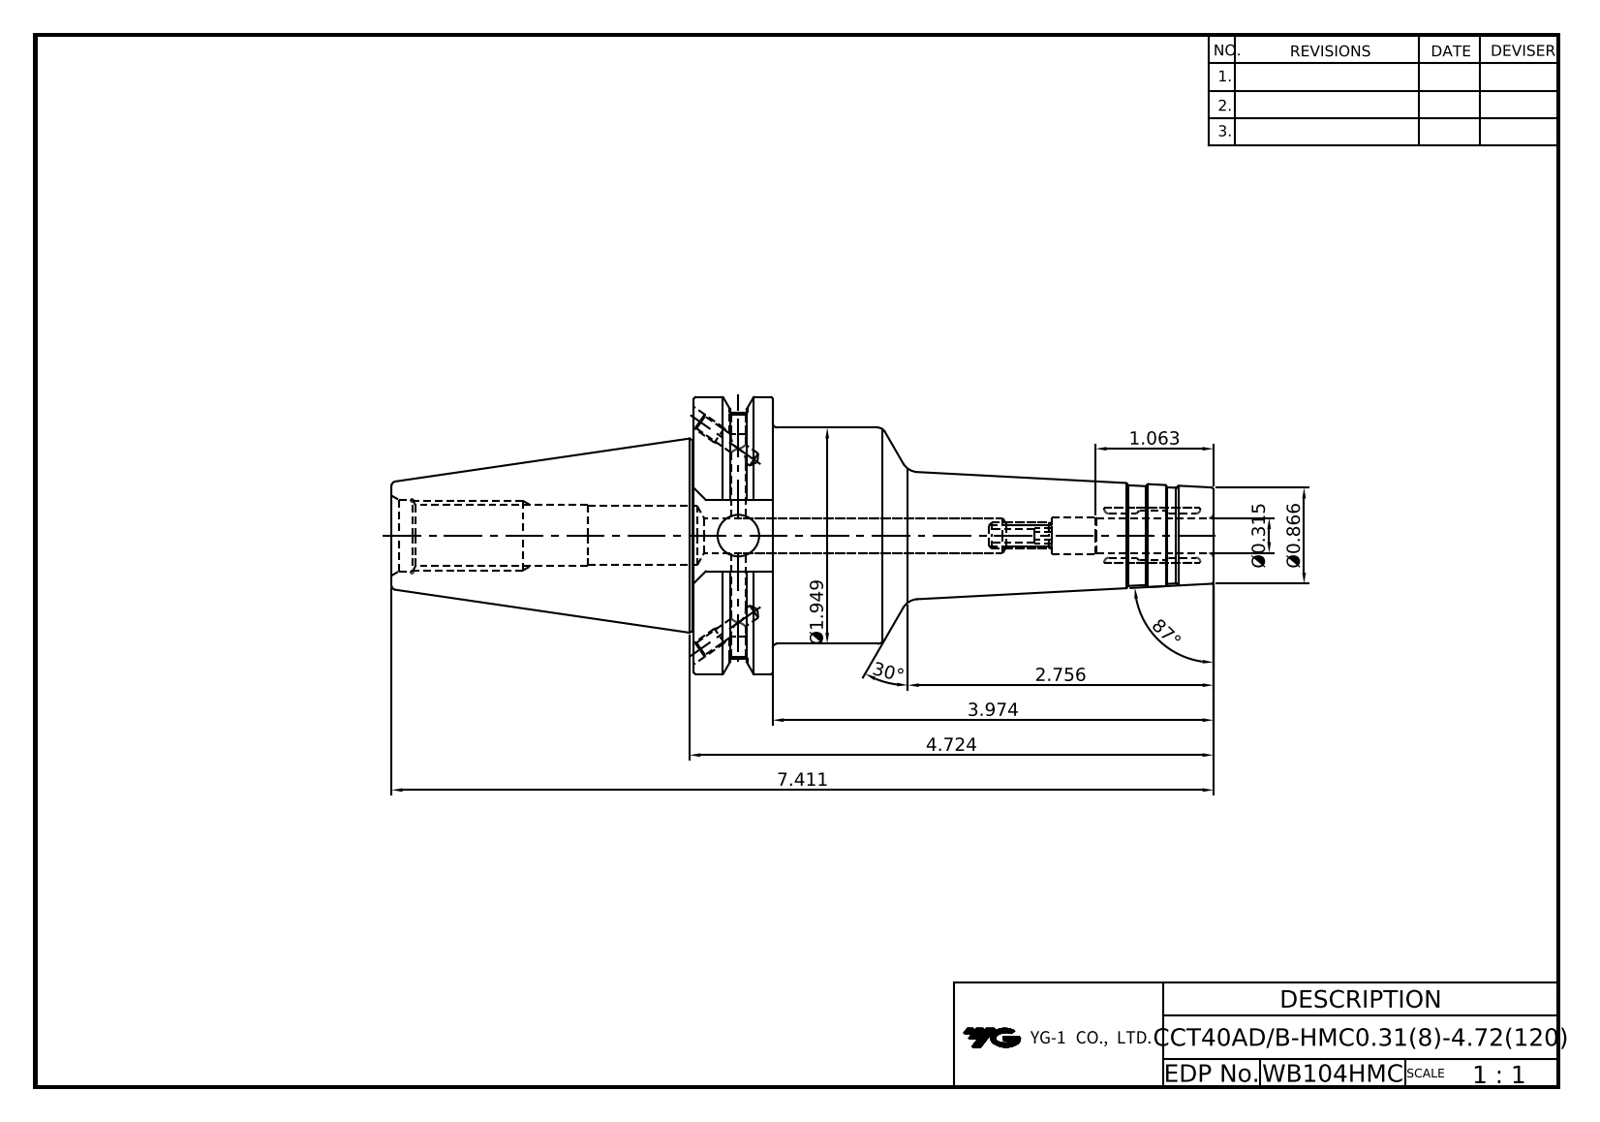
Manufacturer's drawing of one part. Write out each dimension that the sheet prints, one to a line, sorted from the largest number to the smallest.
87°
30°
7.411
4.724
3.974
2.756
Ø1.949
1.063
Ø0.866
Ø0.315
